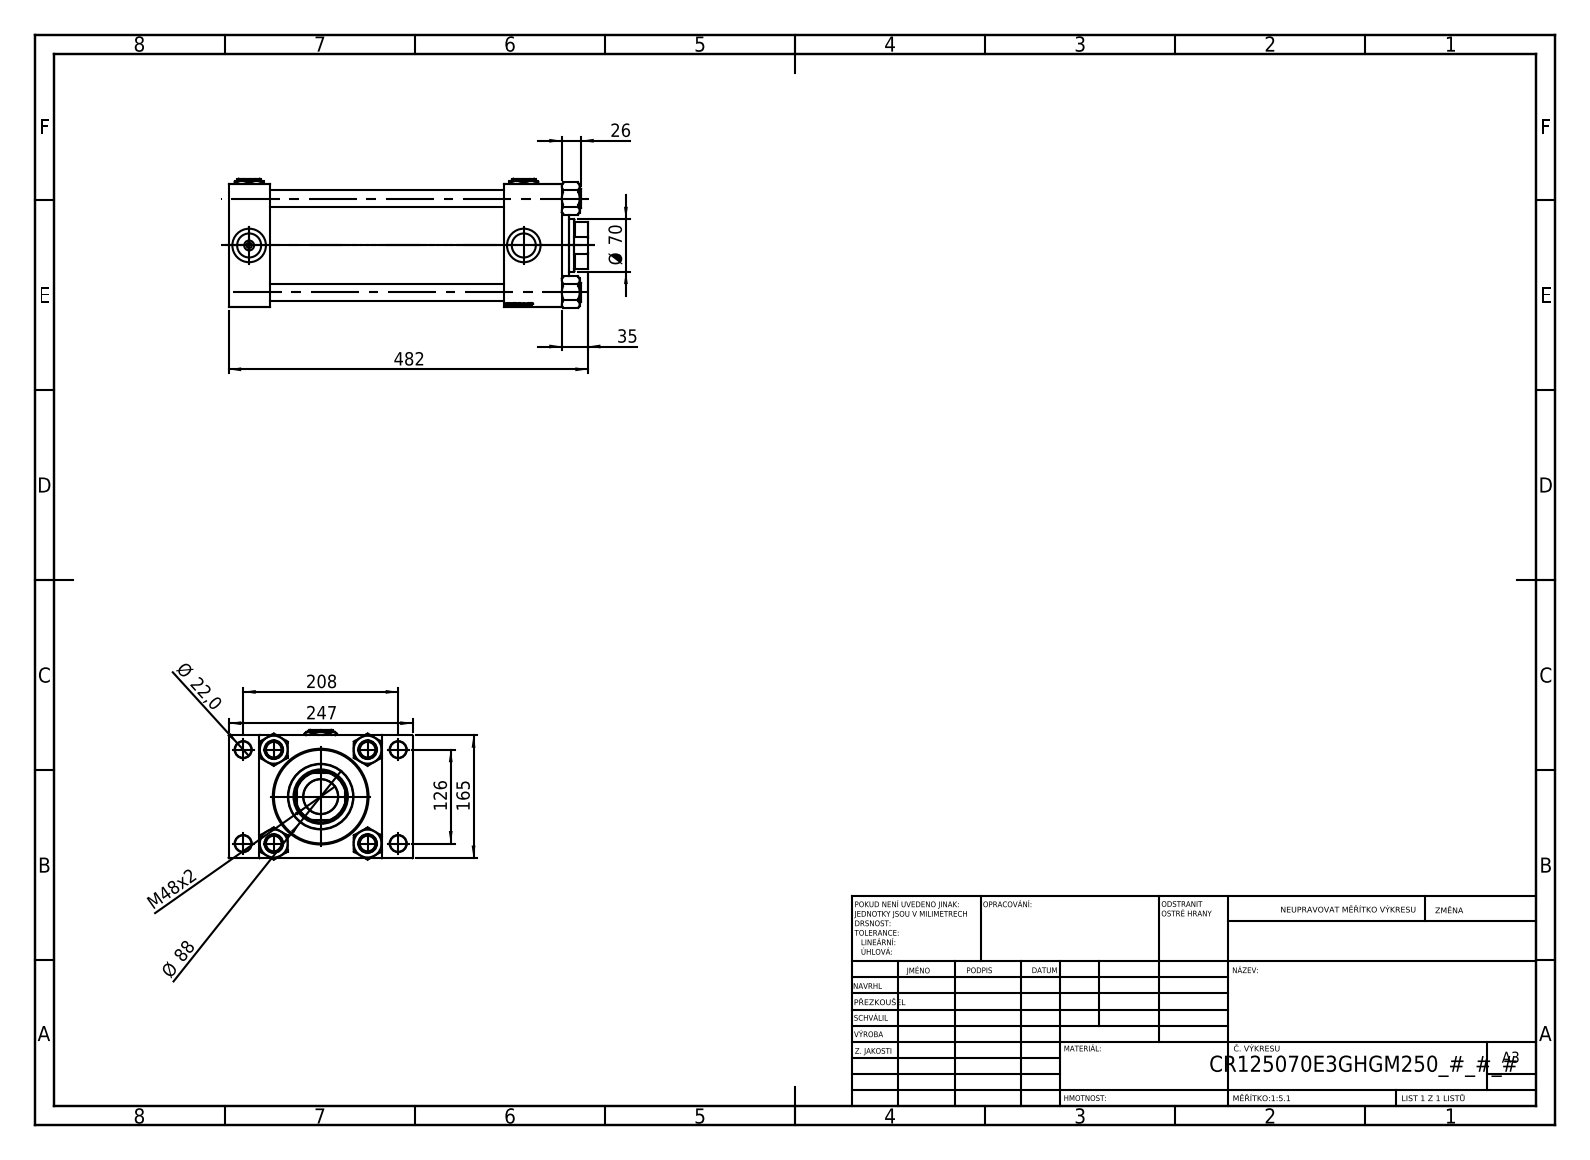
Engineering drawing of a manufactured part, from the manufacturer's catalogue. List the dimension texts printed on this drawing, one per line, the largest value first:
482
247
208
165
126
Ø 88
Ø 70
M48x2
35
26
Ø 22,0
